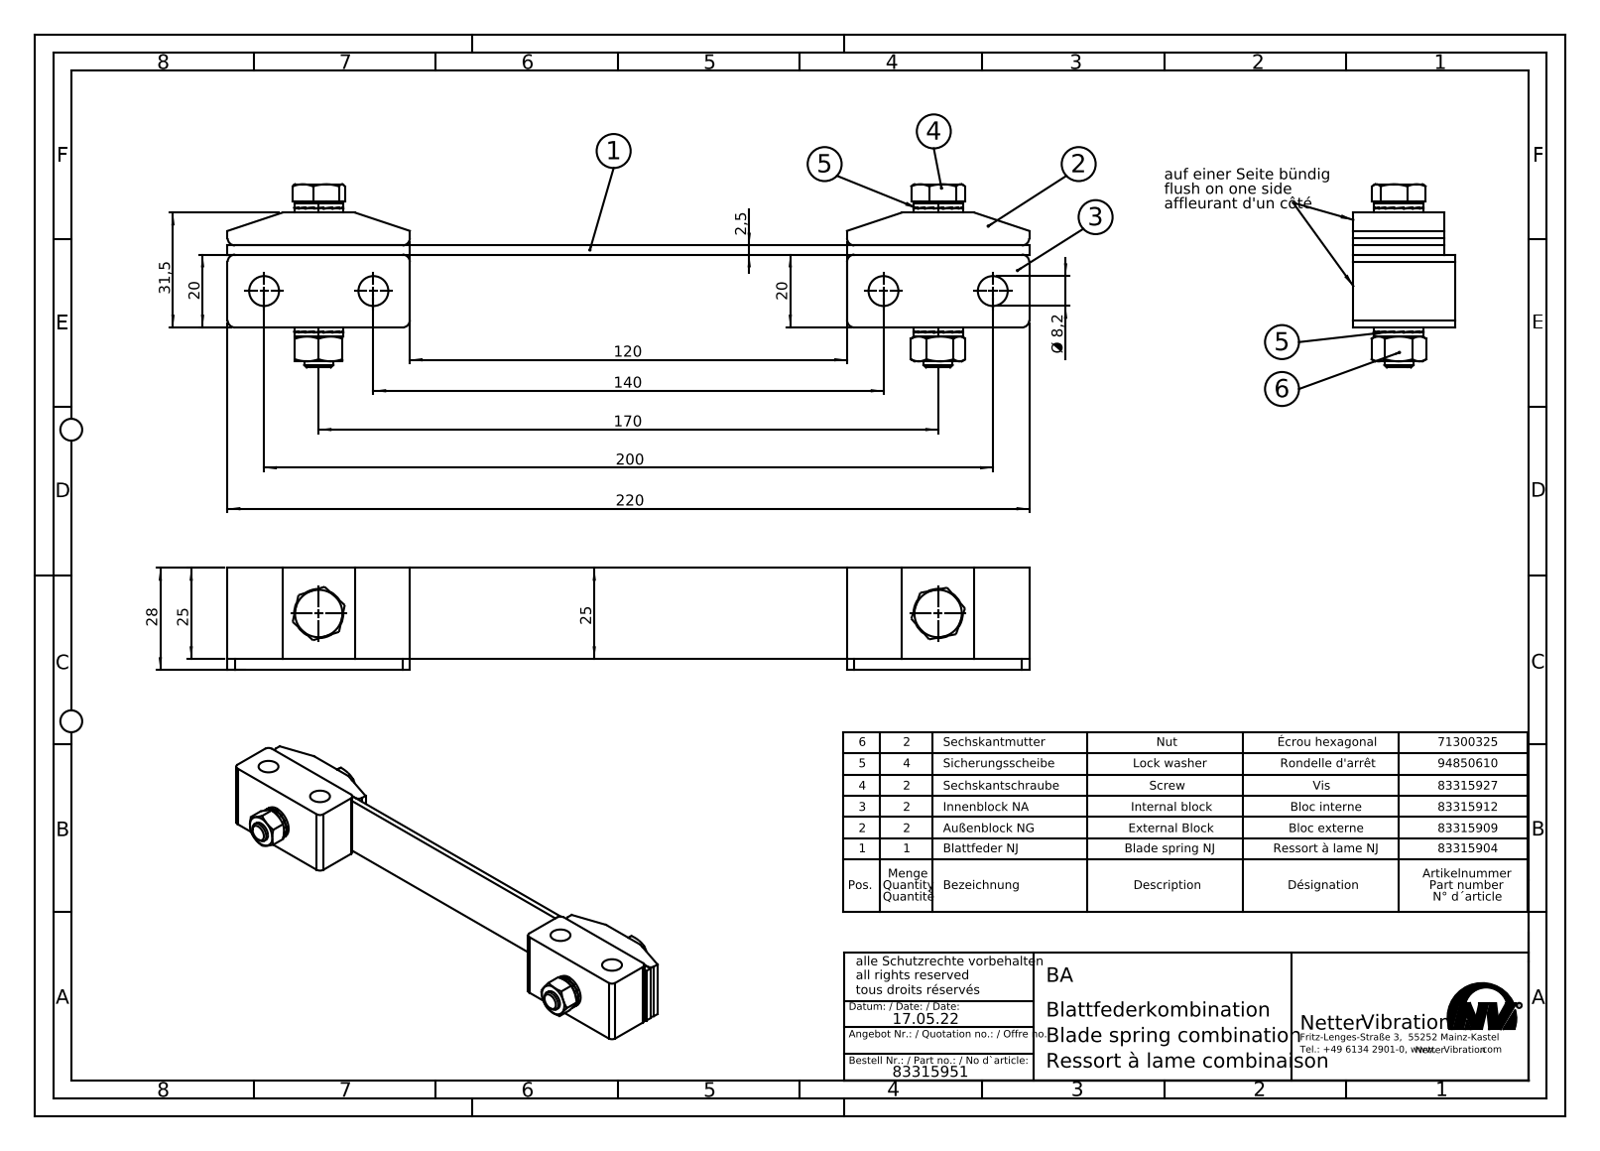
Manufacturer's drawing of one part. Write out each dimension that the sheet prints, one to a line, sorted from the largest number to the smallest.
220
200
170
140
120
31,5
28
25
25
20
20
Ø 8,2
2,5
